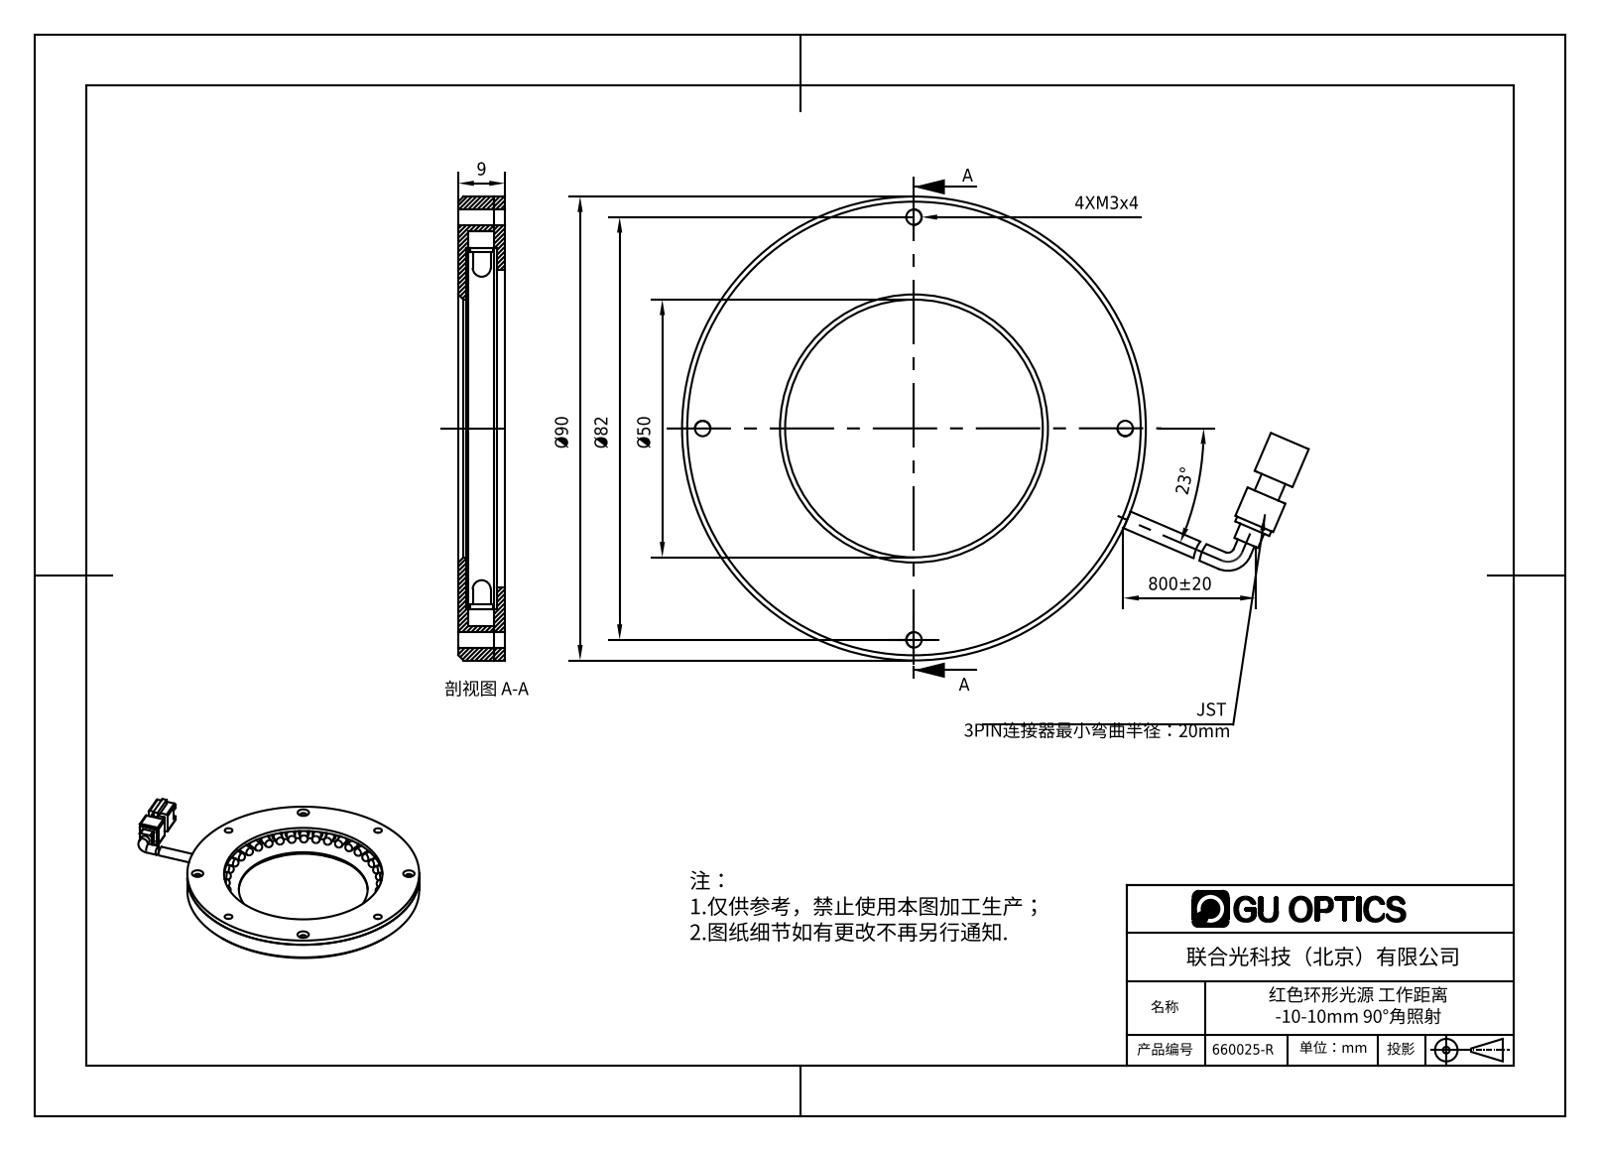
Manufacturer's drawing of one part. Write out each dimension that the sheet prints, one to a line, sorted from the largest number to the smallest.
800±20
Ø90
Ø82
Ø50
23°
9
4XM3x4
